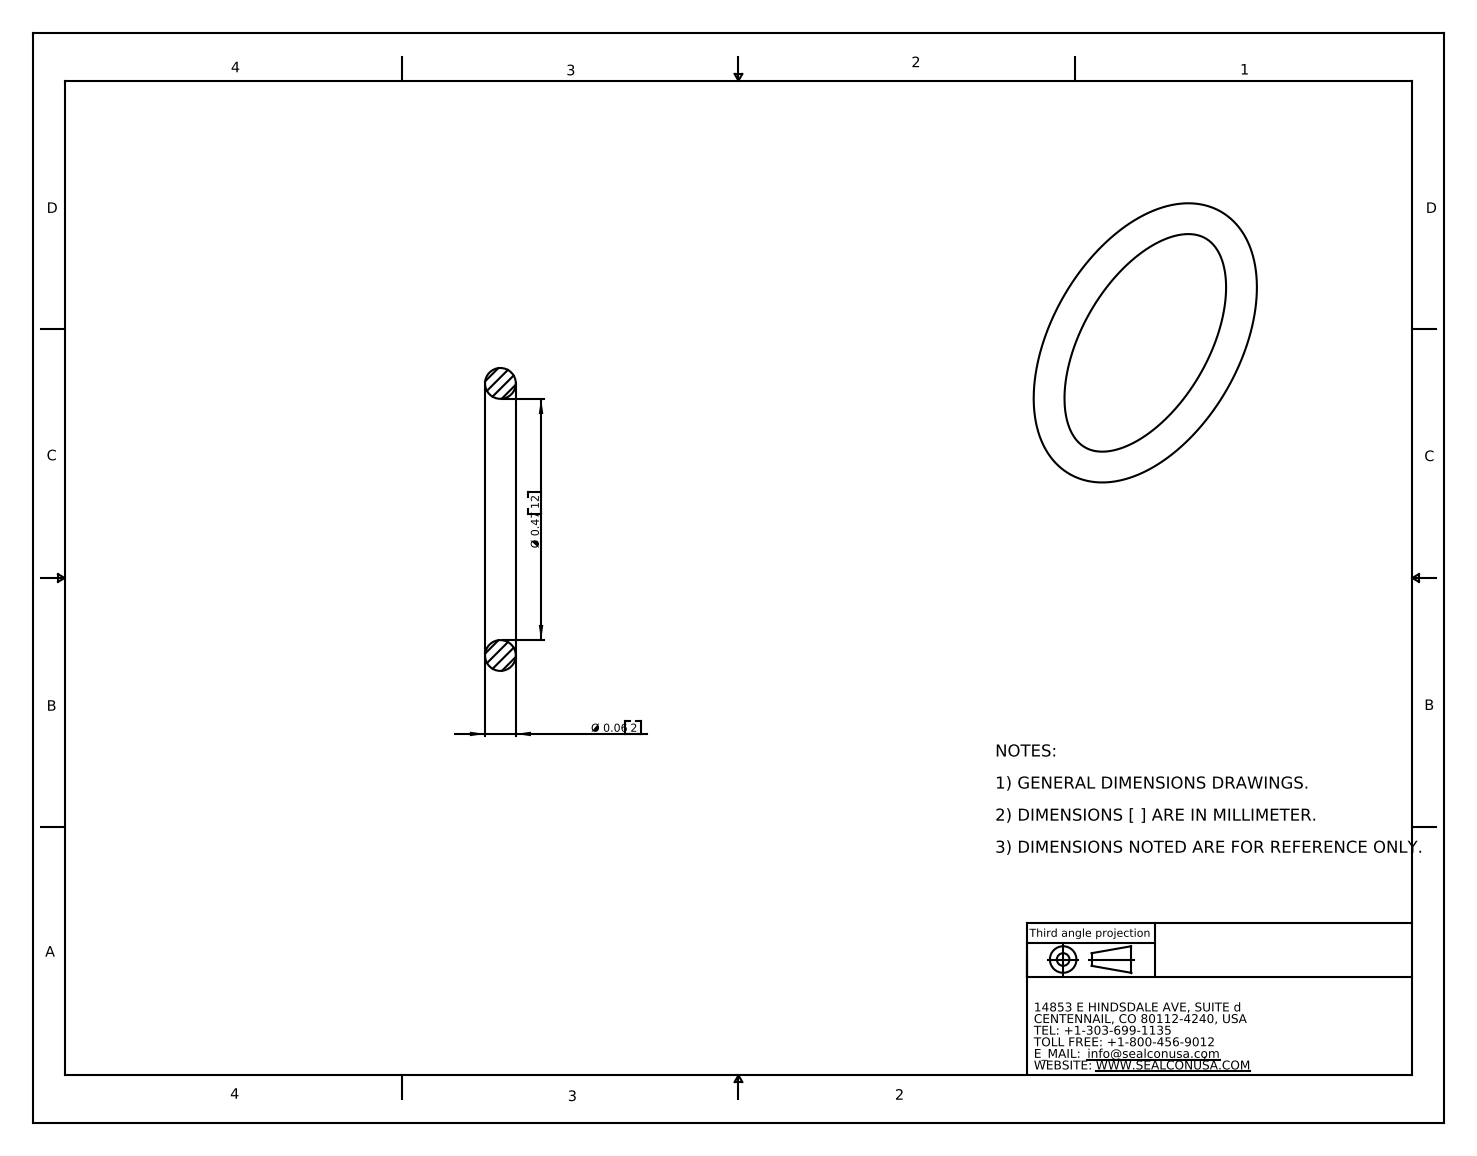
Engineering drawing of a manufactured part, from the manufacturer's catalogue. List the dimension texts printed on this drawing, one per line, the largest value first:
Ø 0.47 12
Ø 0.06 2
